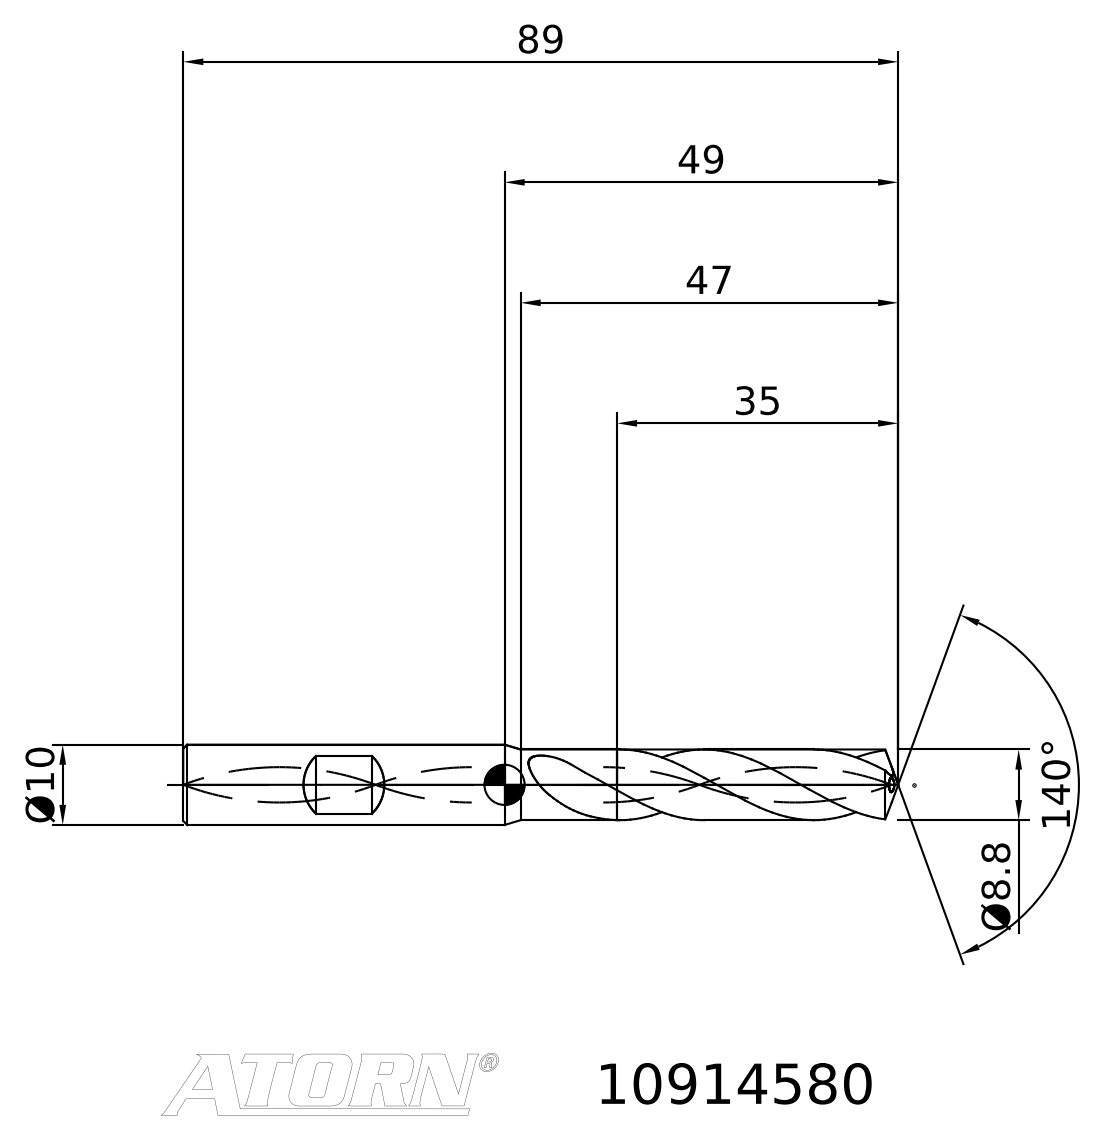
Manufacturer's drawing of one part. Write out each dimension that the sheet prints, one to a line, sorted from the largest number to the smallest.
140°
89
49
47
35
Ø10
Ø8.8
